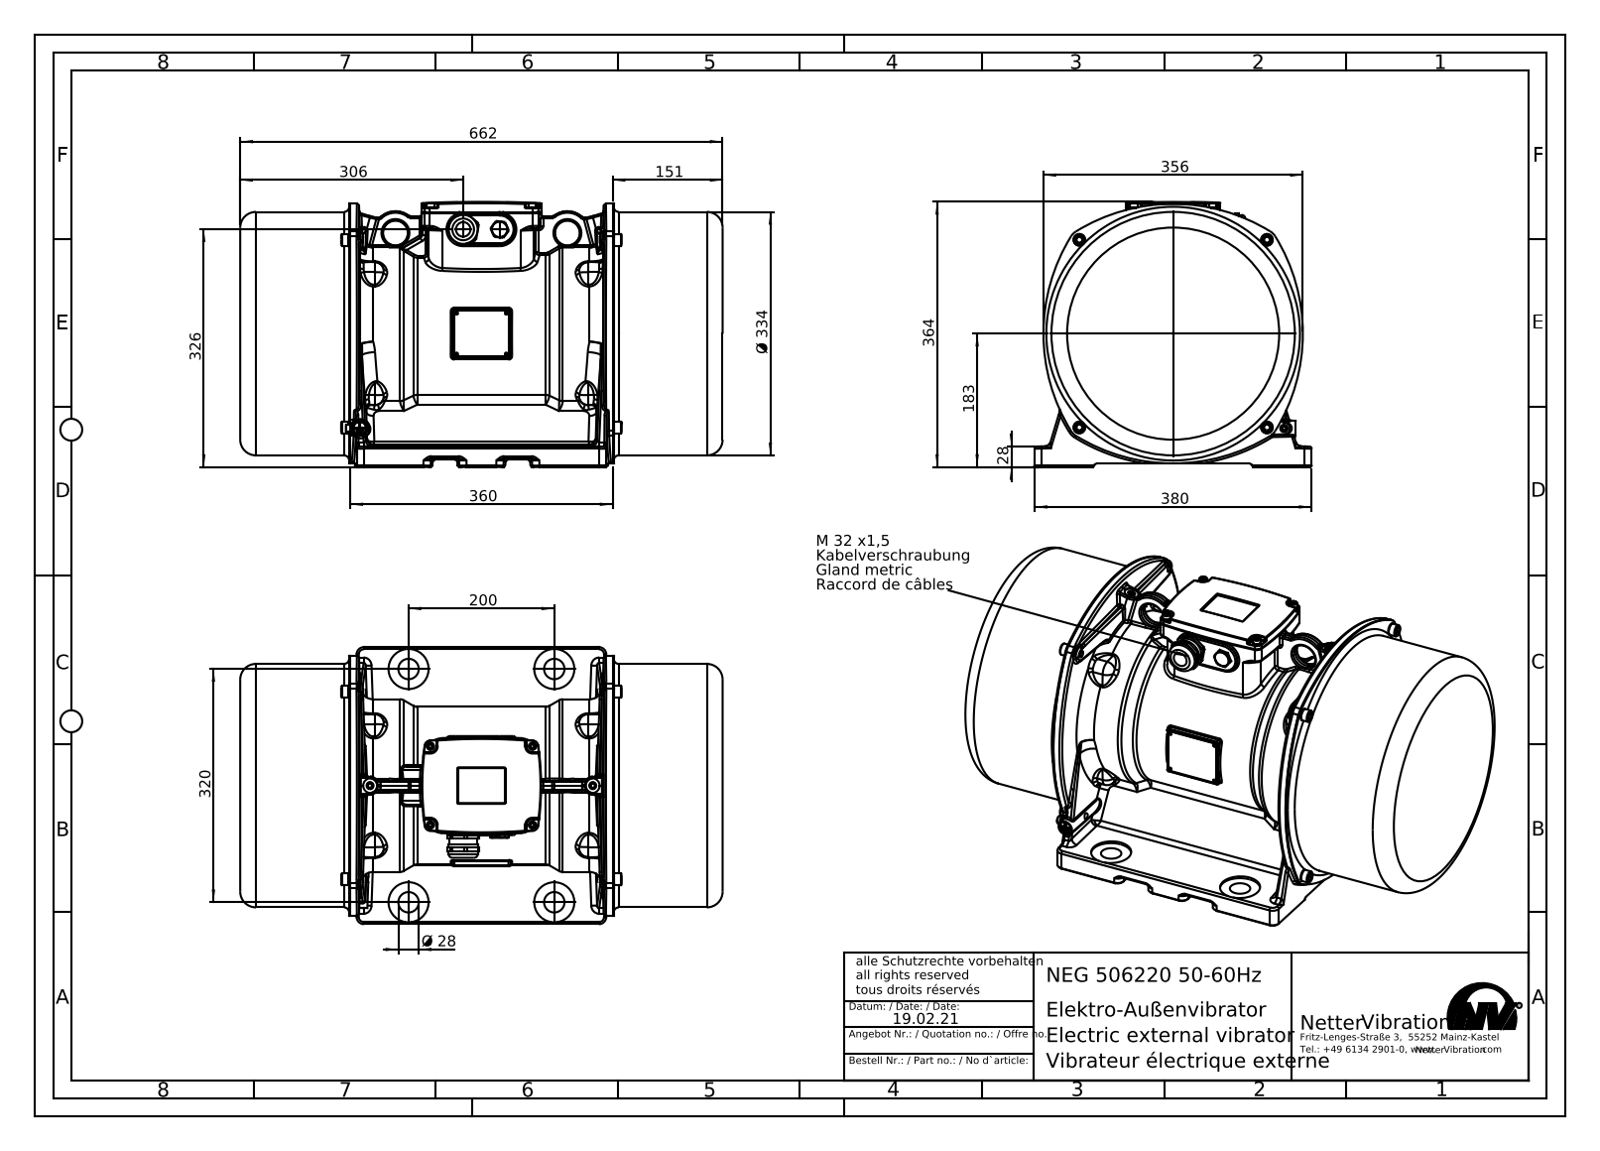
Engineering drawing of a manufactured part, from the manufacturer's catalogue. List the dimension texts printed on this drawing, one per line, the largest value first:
662
380
364
360
356
Ø 334
326
320
306
200
183
151
28
Ø 28
